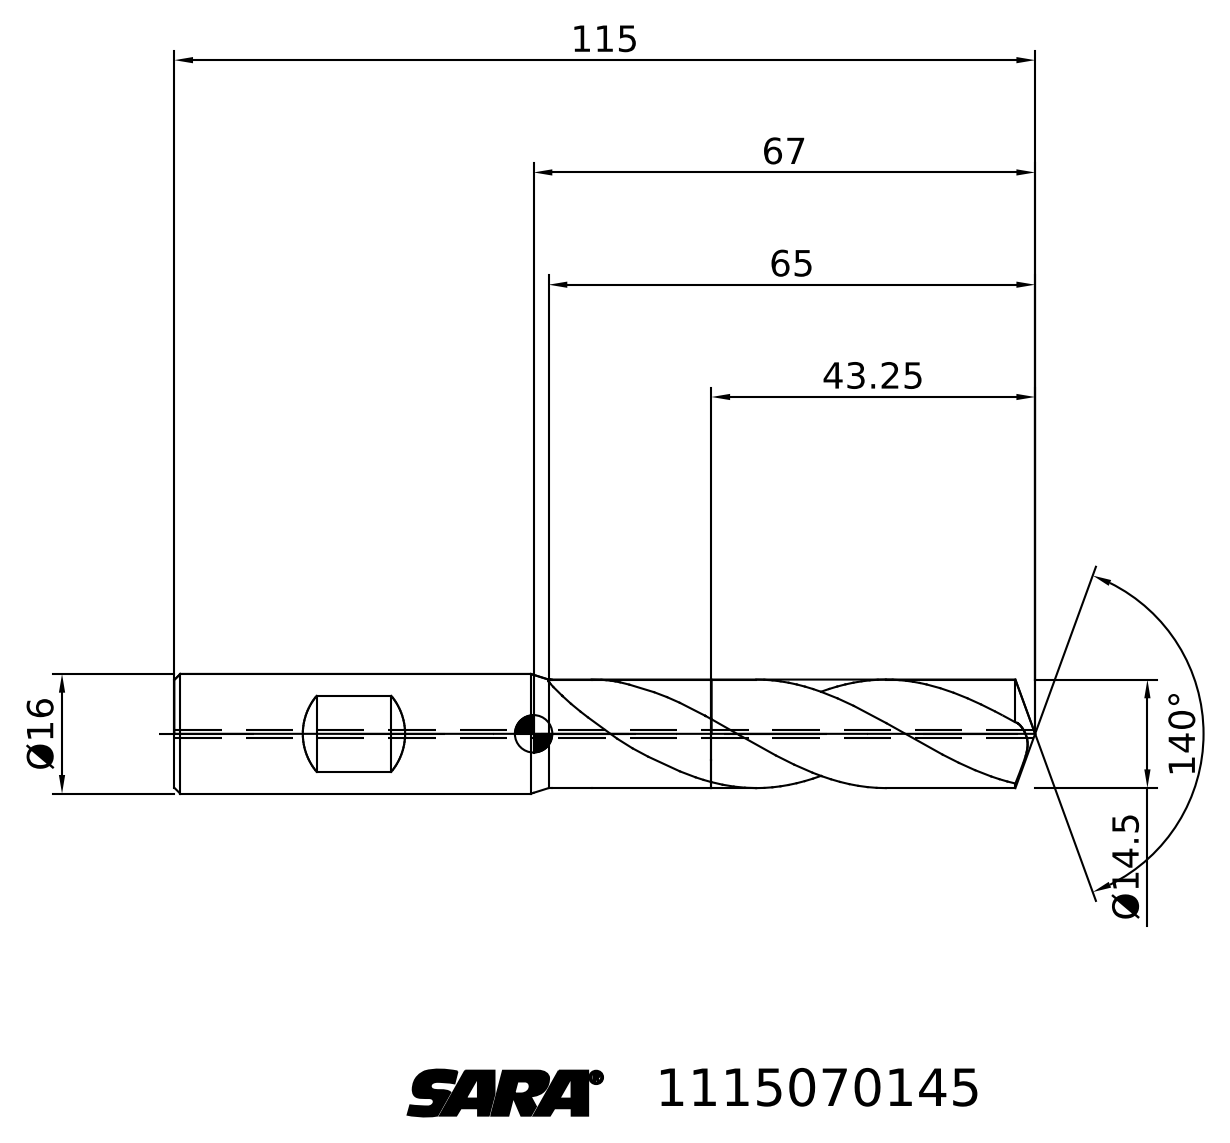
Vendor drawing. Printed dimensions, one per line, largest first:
140°
115
67
65
43.25
Ø16
Ø14.5
